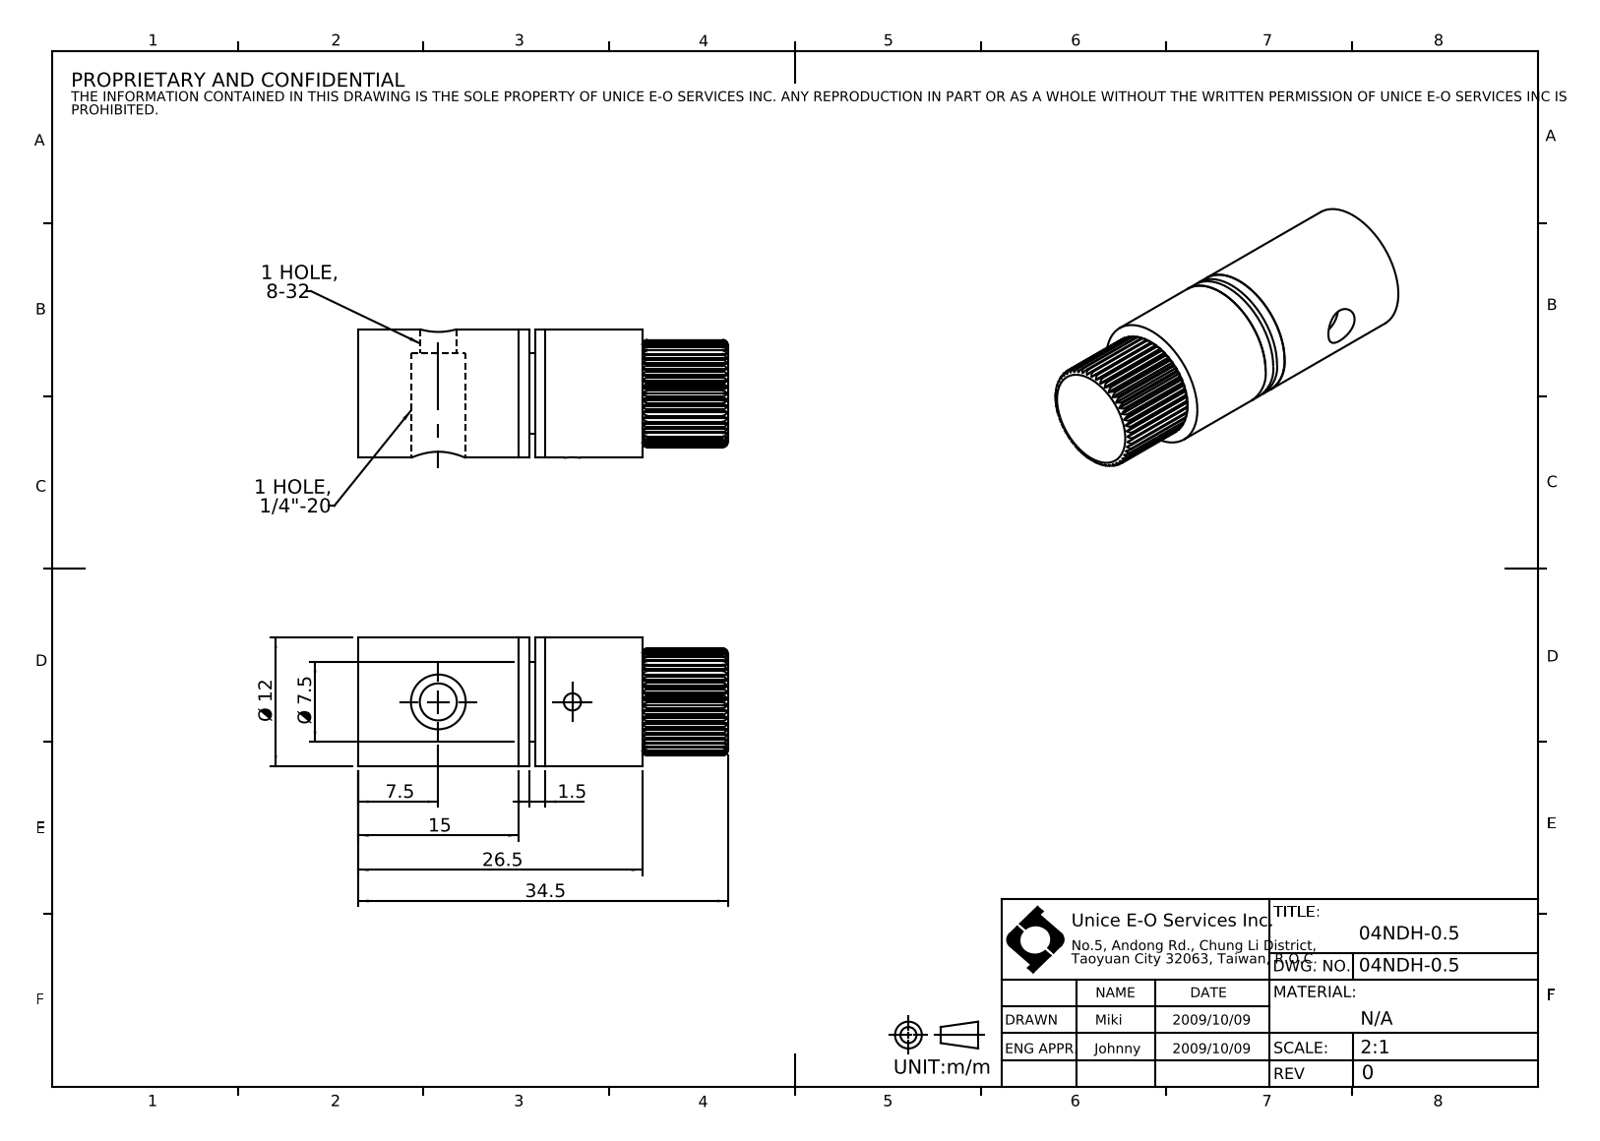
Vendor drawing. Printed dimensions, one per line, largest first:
34.5
26.5
15
Ø 12
7.5
Ø 7.5
1.5
